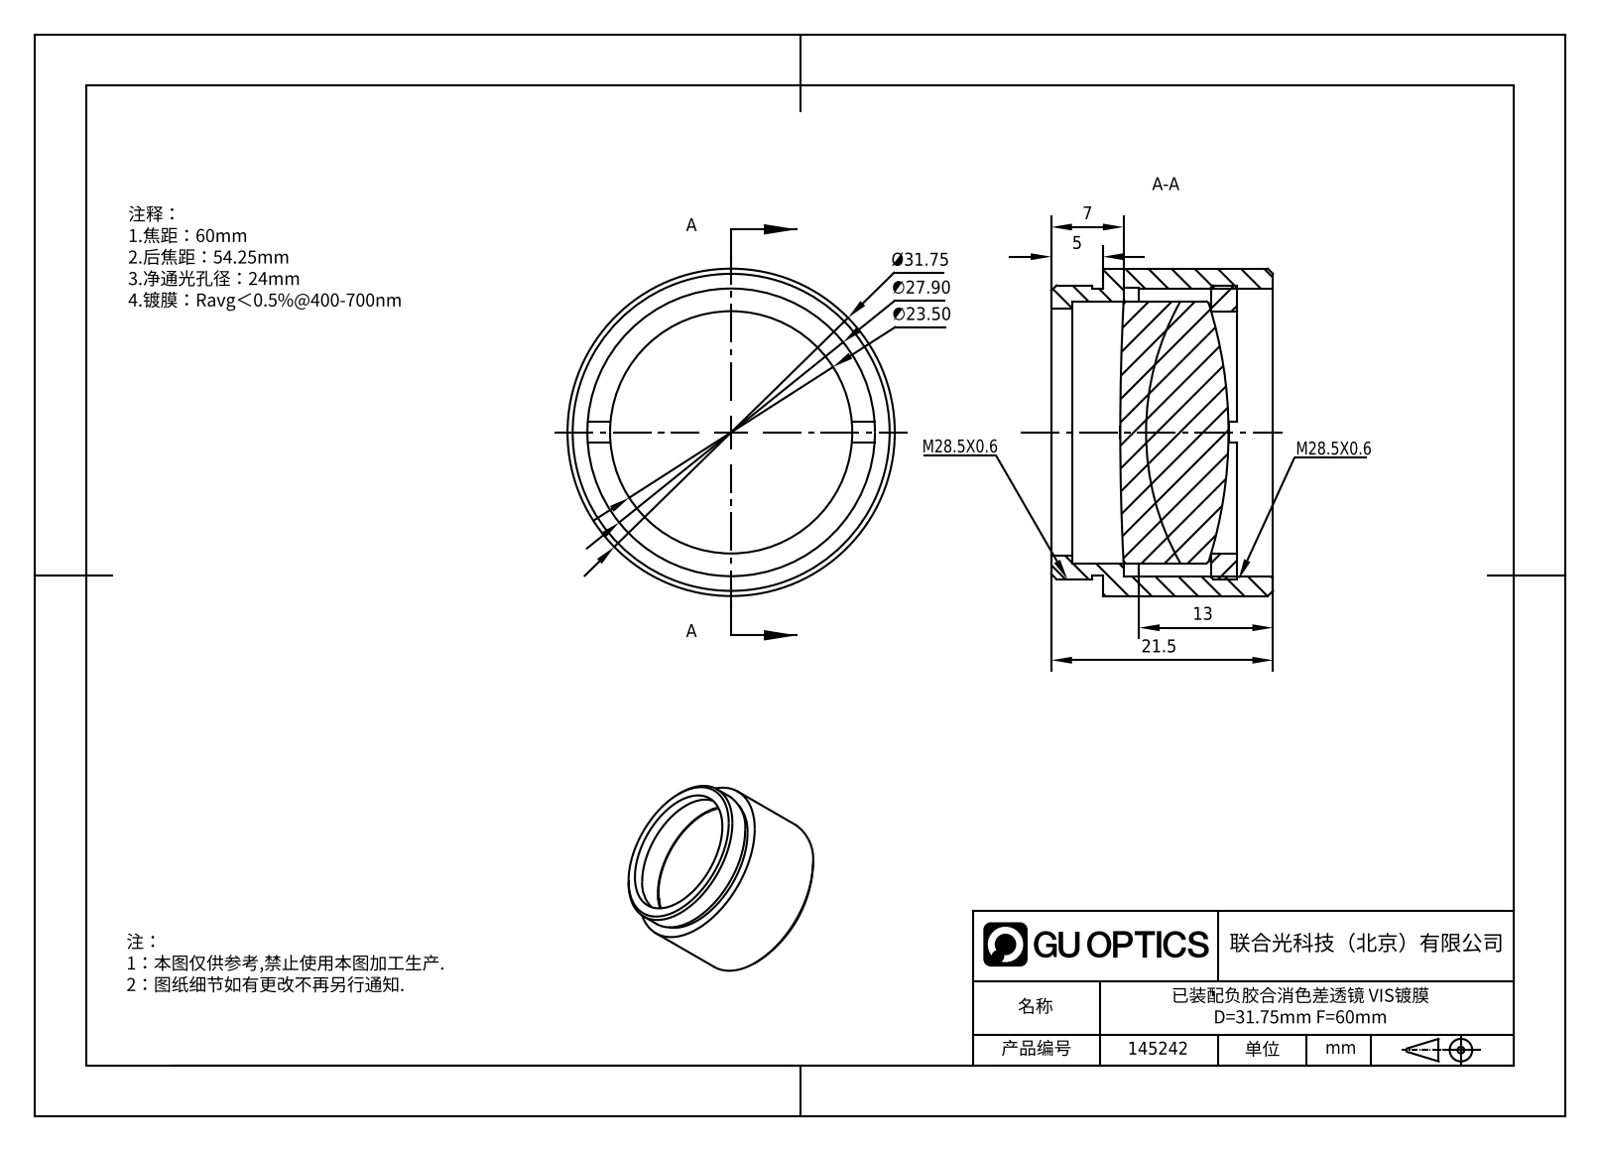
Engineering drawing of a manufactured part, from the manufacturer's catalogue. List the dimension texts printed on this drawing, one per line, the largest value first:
Ø31.75
∅27.90
∅23.50
21.5
13
7
5
